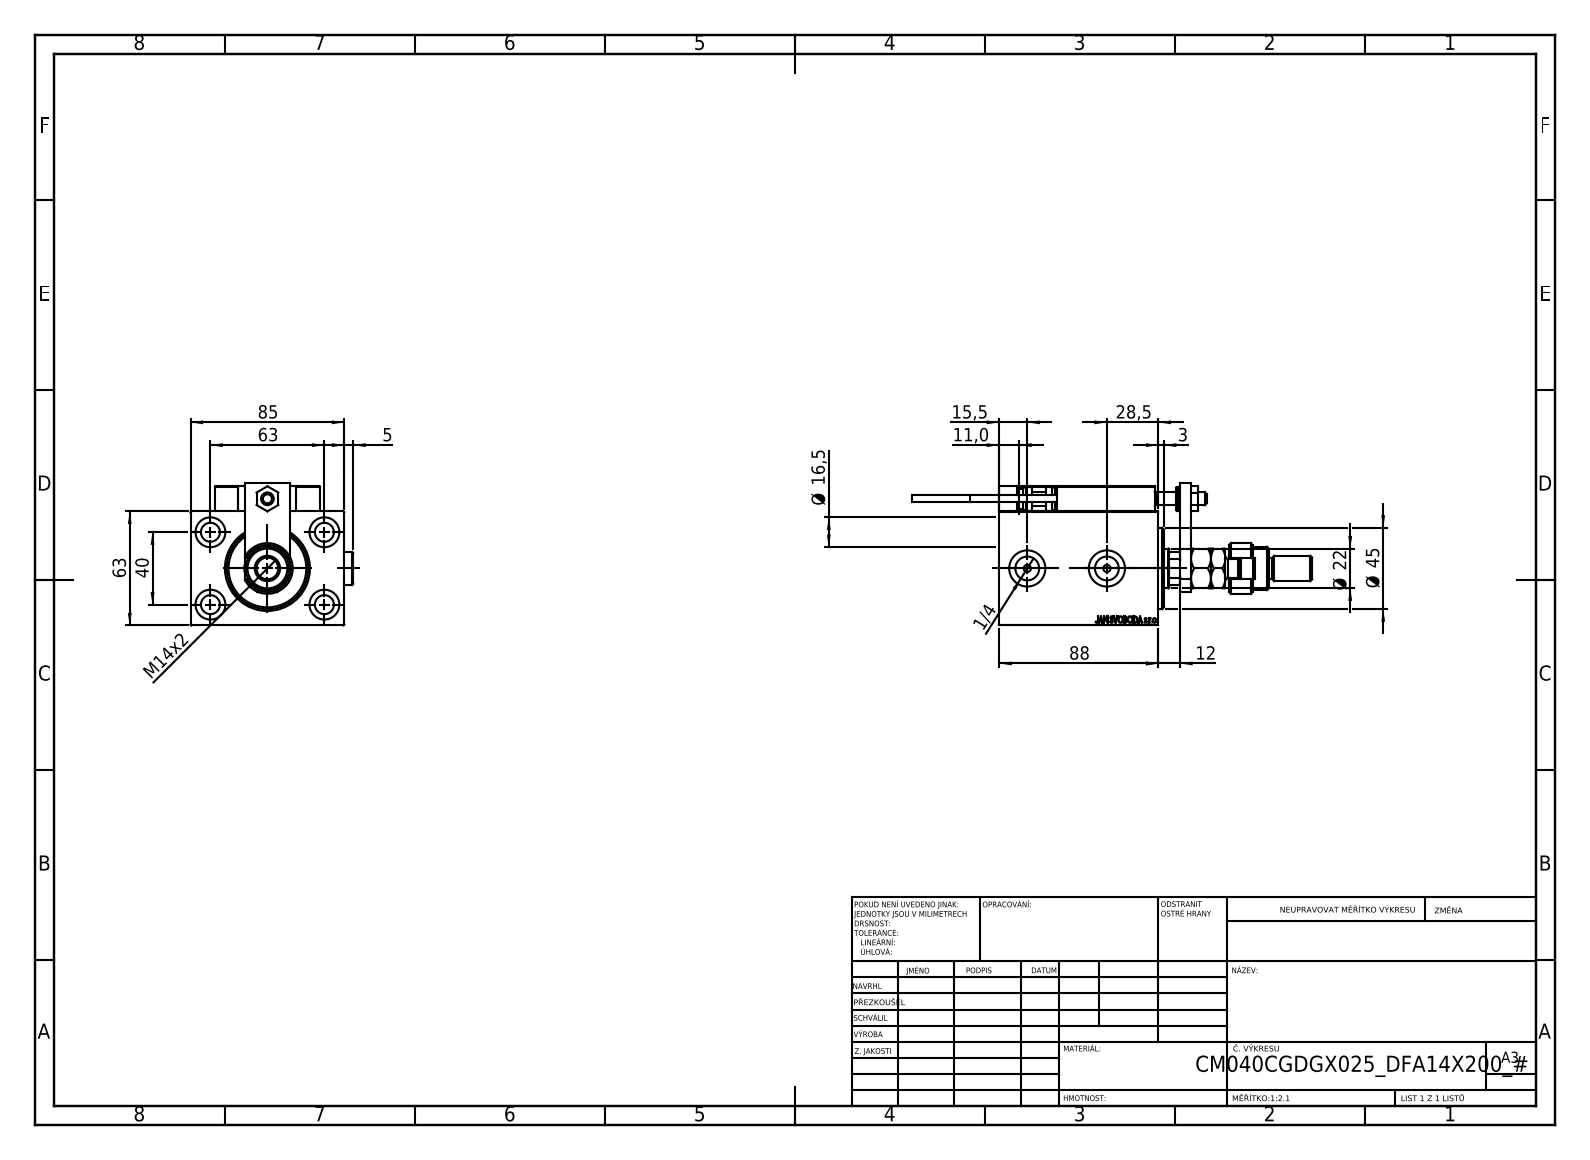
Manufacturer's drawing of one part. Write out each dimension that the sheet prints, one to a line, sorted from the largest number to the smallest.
88
85
63
63
Ø 45
40
28,5
Ø 22
Ø 16,5
15,5
M14x2
12
11,0
5
3
1/4
